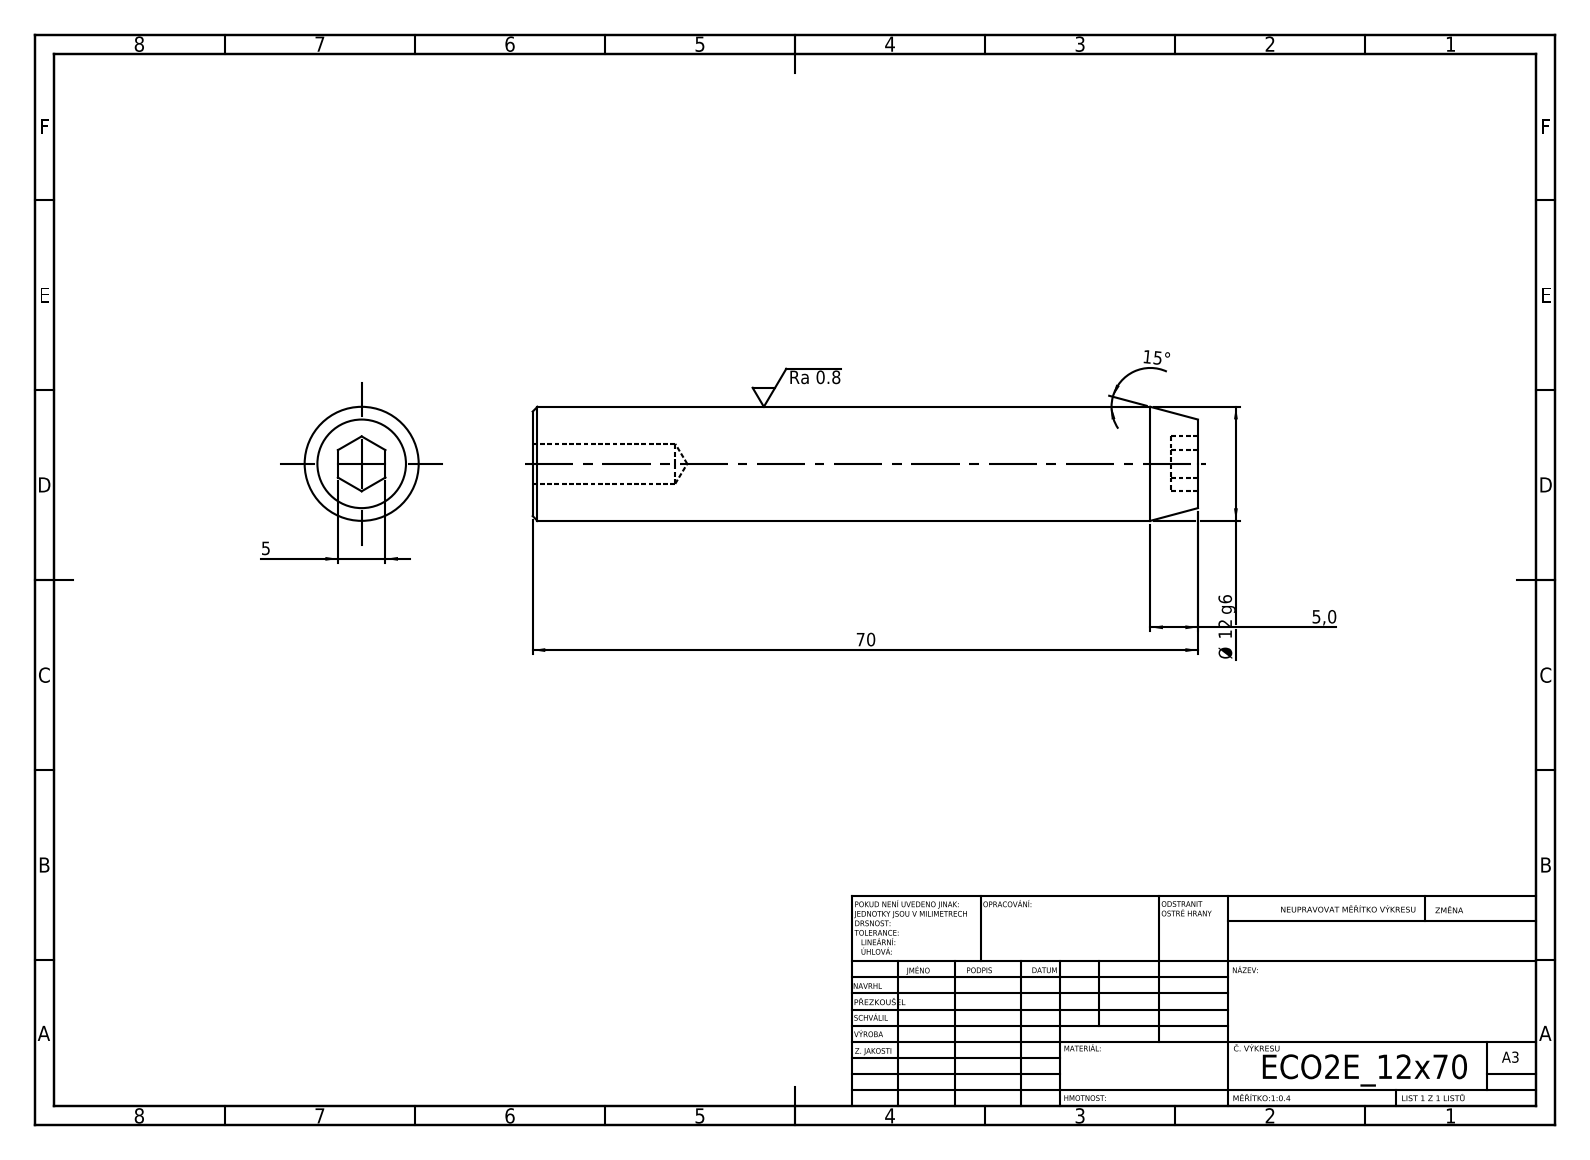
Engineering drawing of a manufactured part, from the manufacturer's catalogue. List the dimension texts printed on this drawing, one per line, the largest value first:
70
15°
Ø 12 g6
5,0
5
